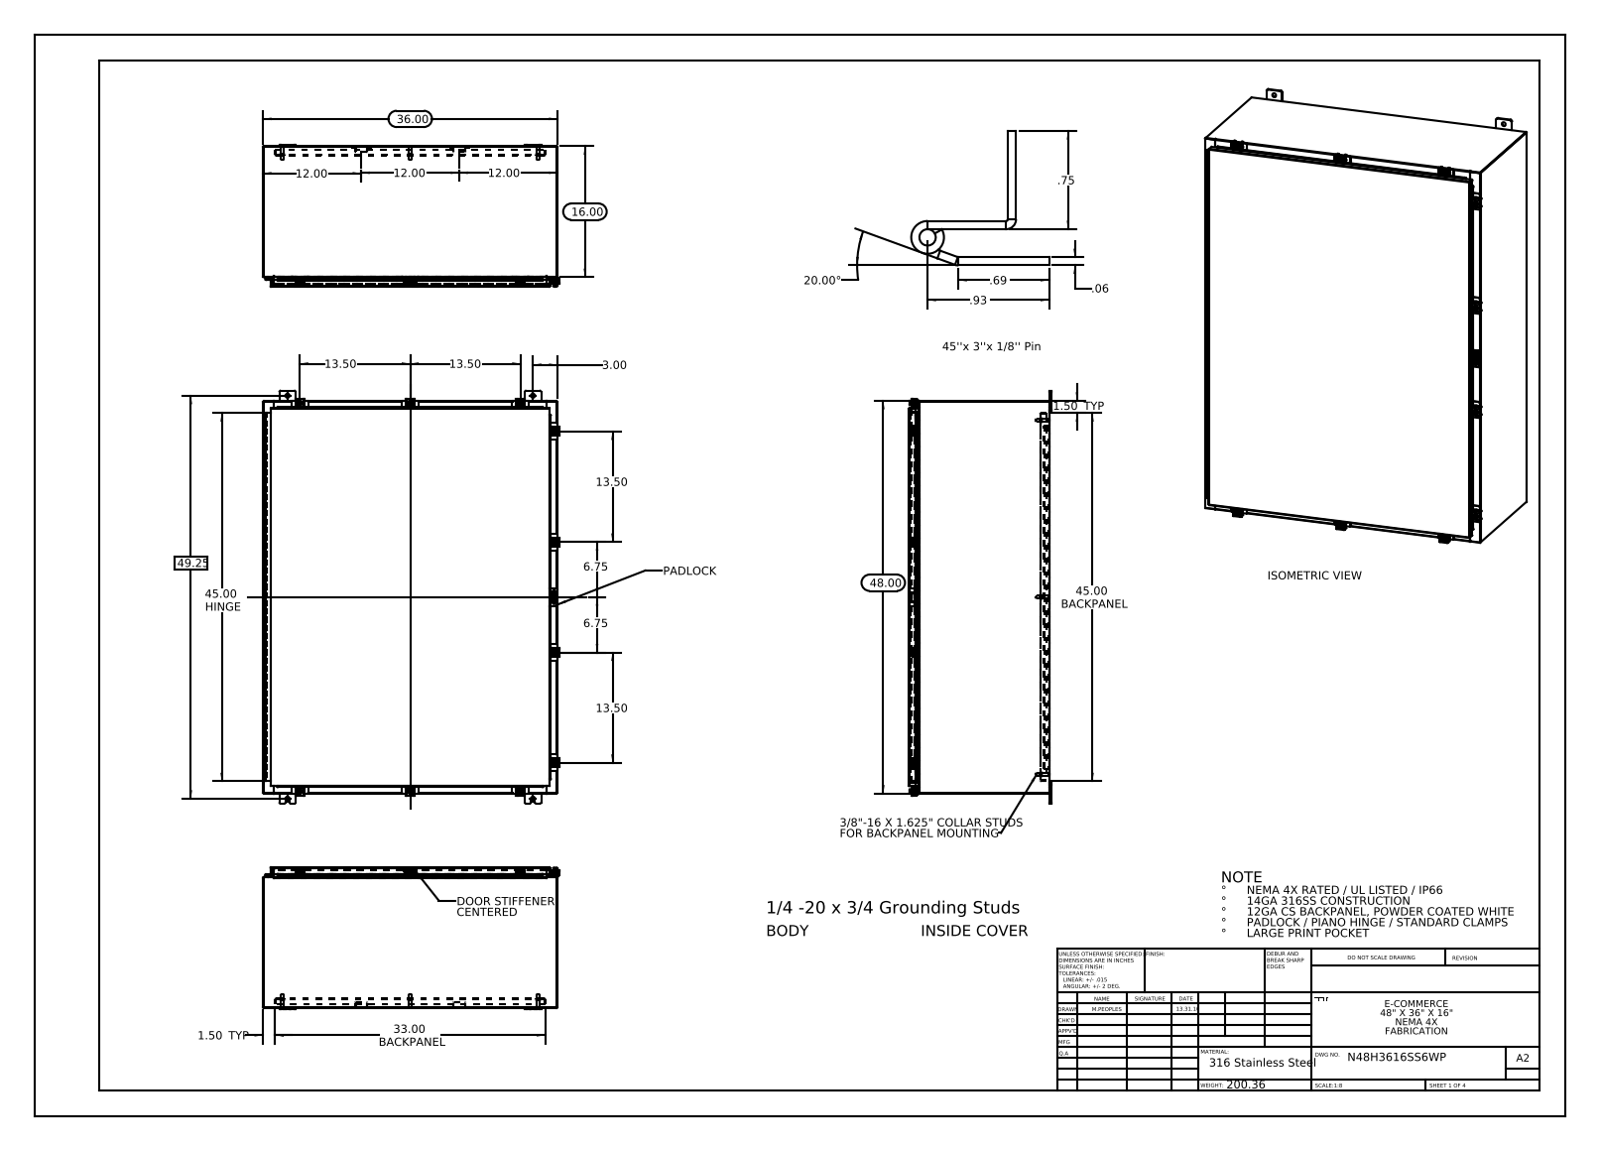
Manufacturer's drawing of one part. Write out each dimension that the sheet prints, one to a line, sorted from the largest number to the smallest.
49.25
48.00
45.00 HINGE
45.00 BACKPANEL
36.00
33.00 BACKPANEL
20.00°
16.00
13.50
13.50
13.50
13.50
12.00
12.00
12.00
6.75
6.75
3.00
1.50 TYP
1.50 TYP
.93
.75
.69
.06
